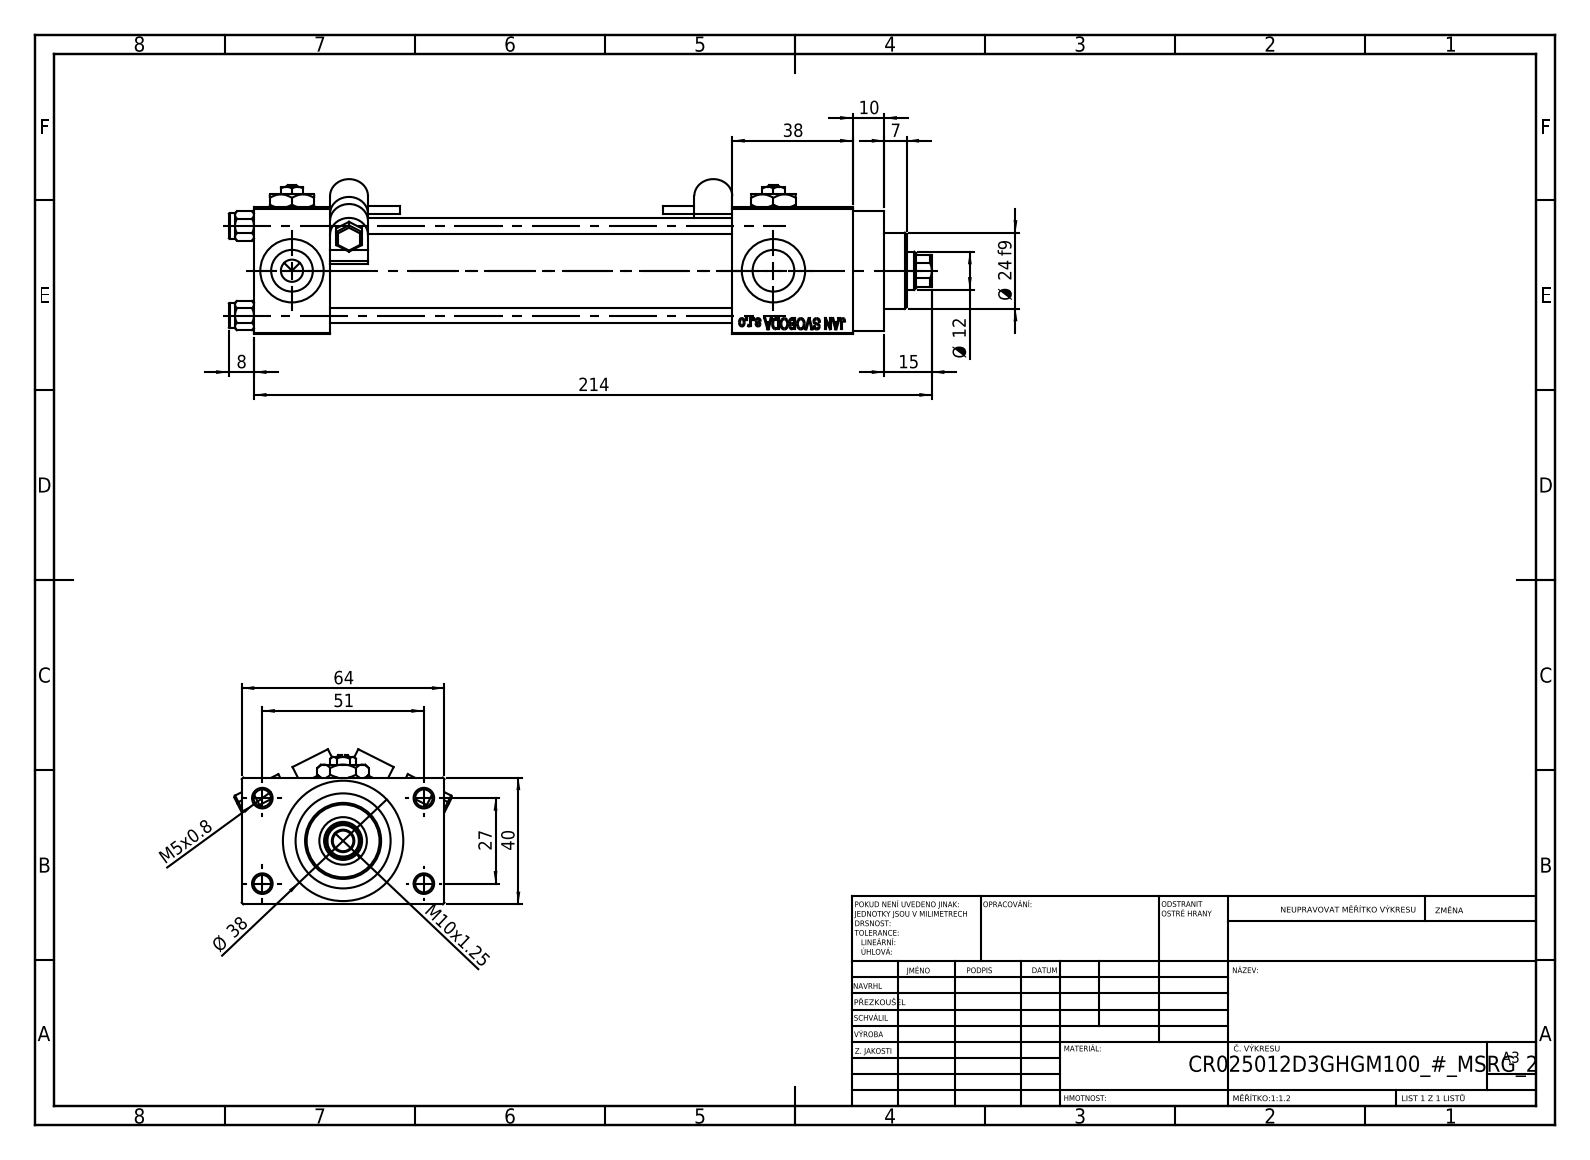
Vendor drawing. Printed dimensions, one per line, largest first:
214
64
51
40
38
Ø 38
27
Ø 24 f9
15
Ø 12
10
M10x1.25
8
7
M5x0.8
